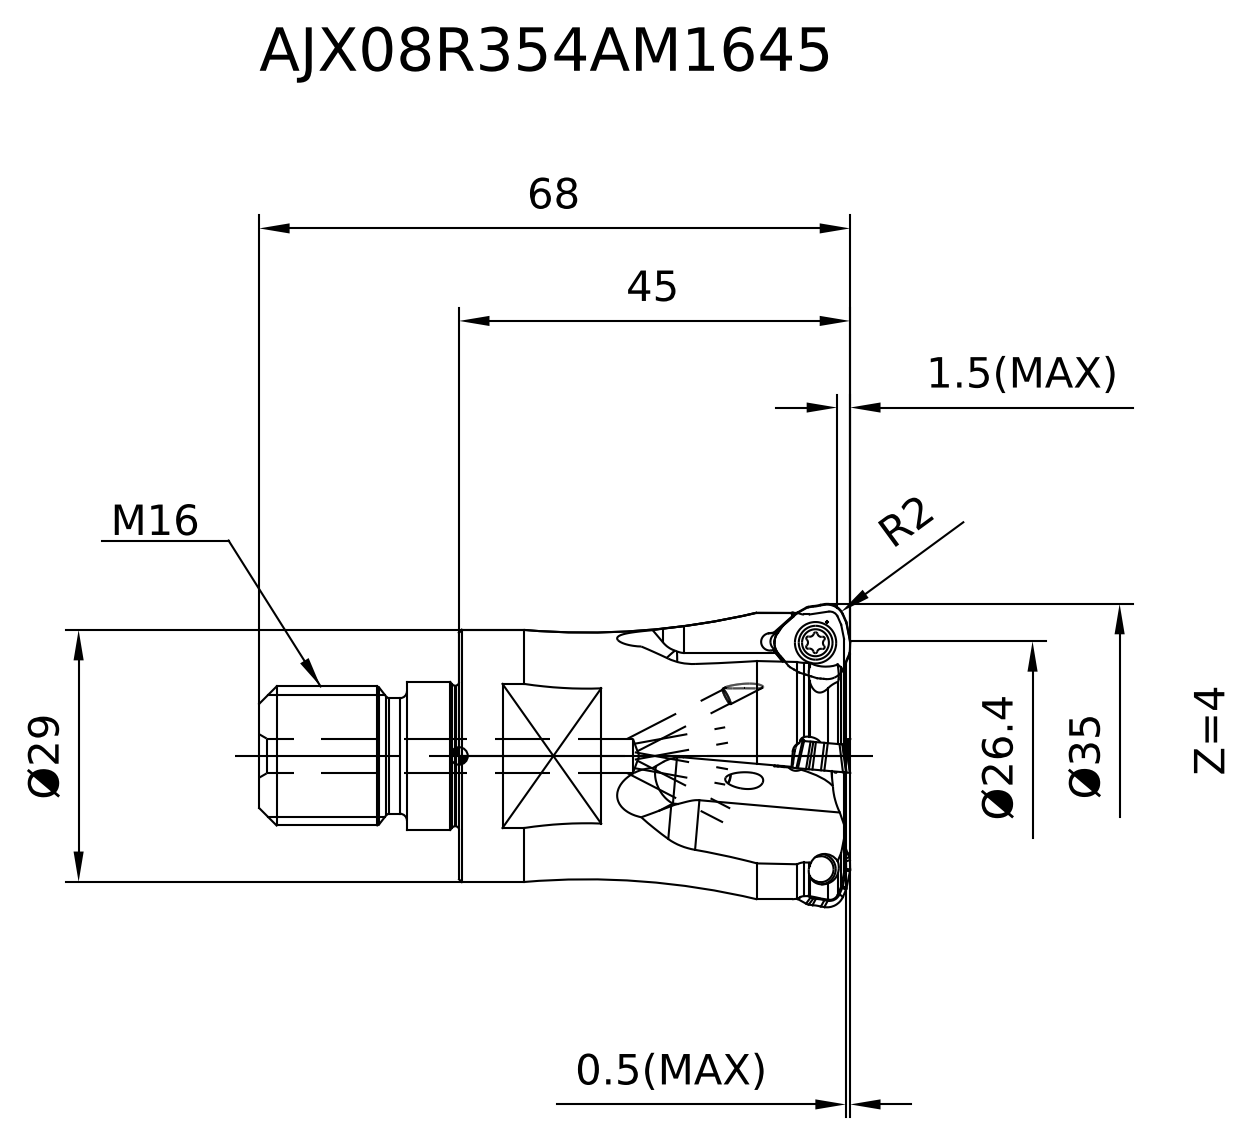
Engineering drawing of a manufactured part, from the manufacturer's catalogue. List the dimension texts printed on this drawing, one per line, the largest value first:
68
45
Ø35
Ø29
Ø26.4
R2
1.5(MAX)
0.5(MAX)
